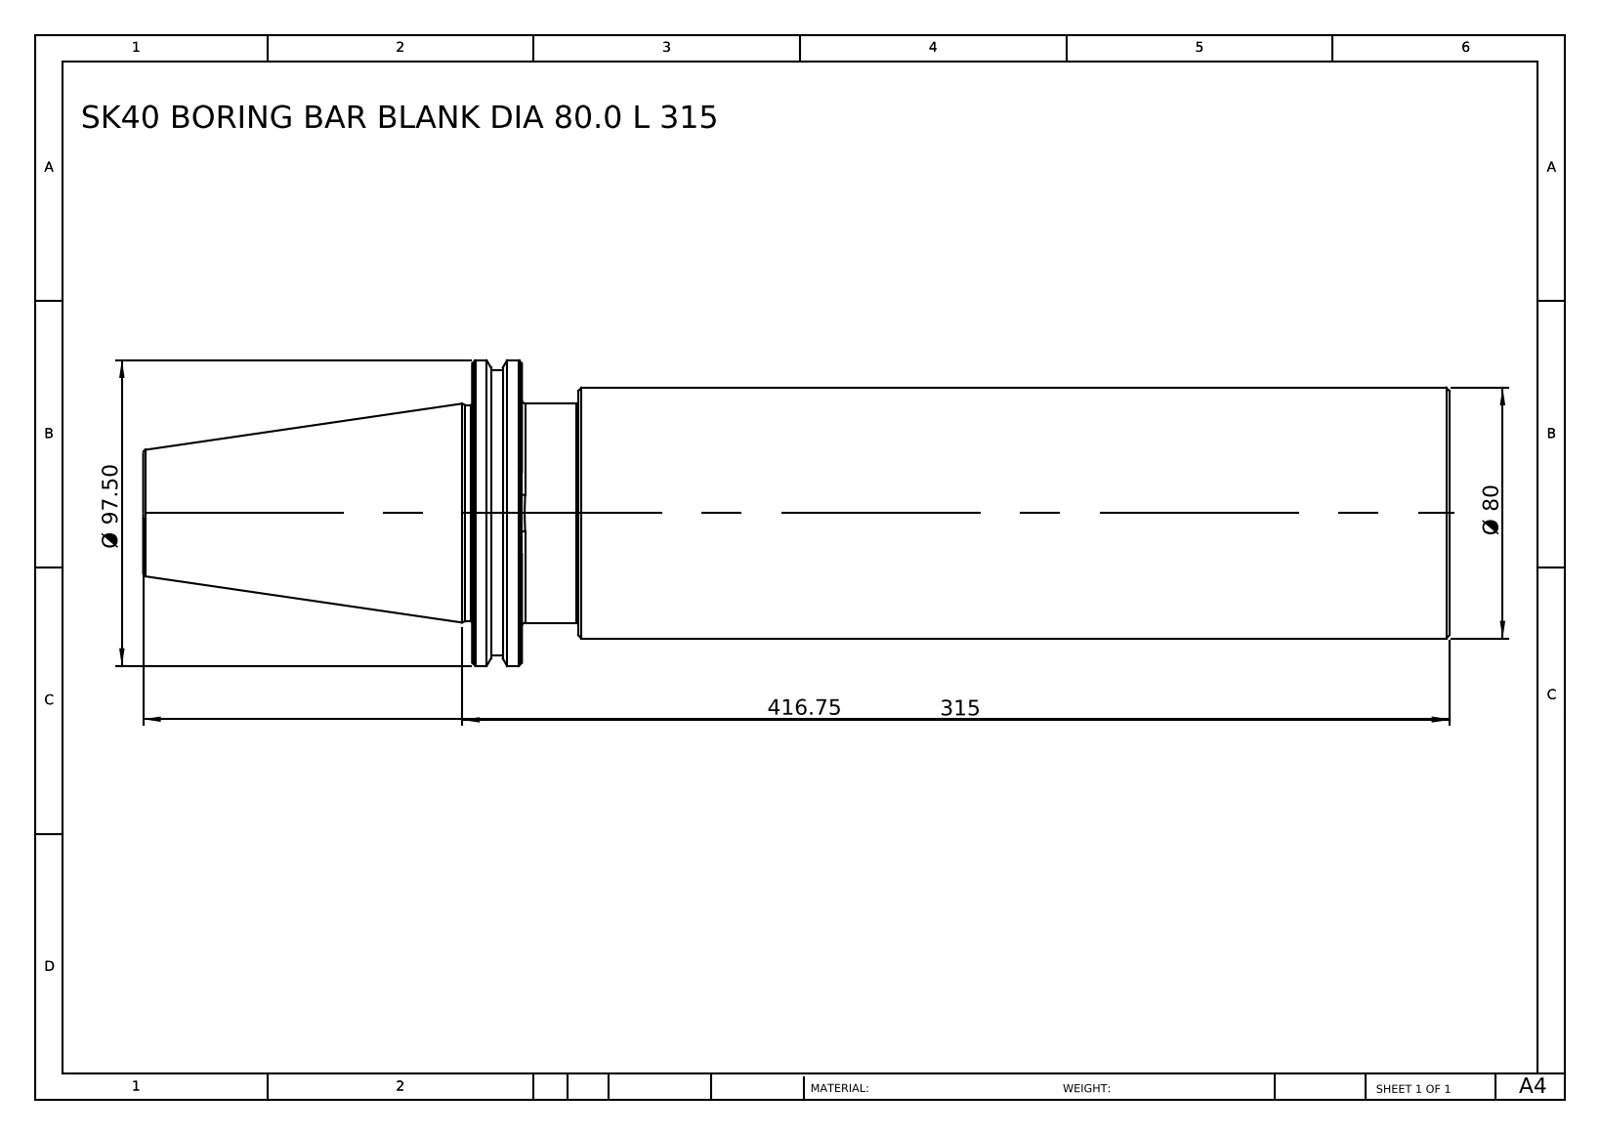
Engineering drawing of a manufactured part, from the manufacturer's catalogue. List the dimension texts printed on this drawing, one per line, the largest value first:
416.75
315
Ø 97.50
Ø 80
